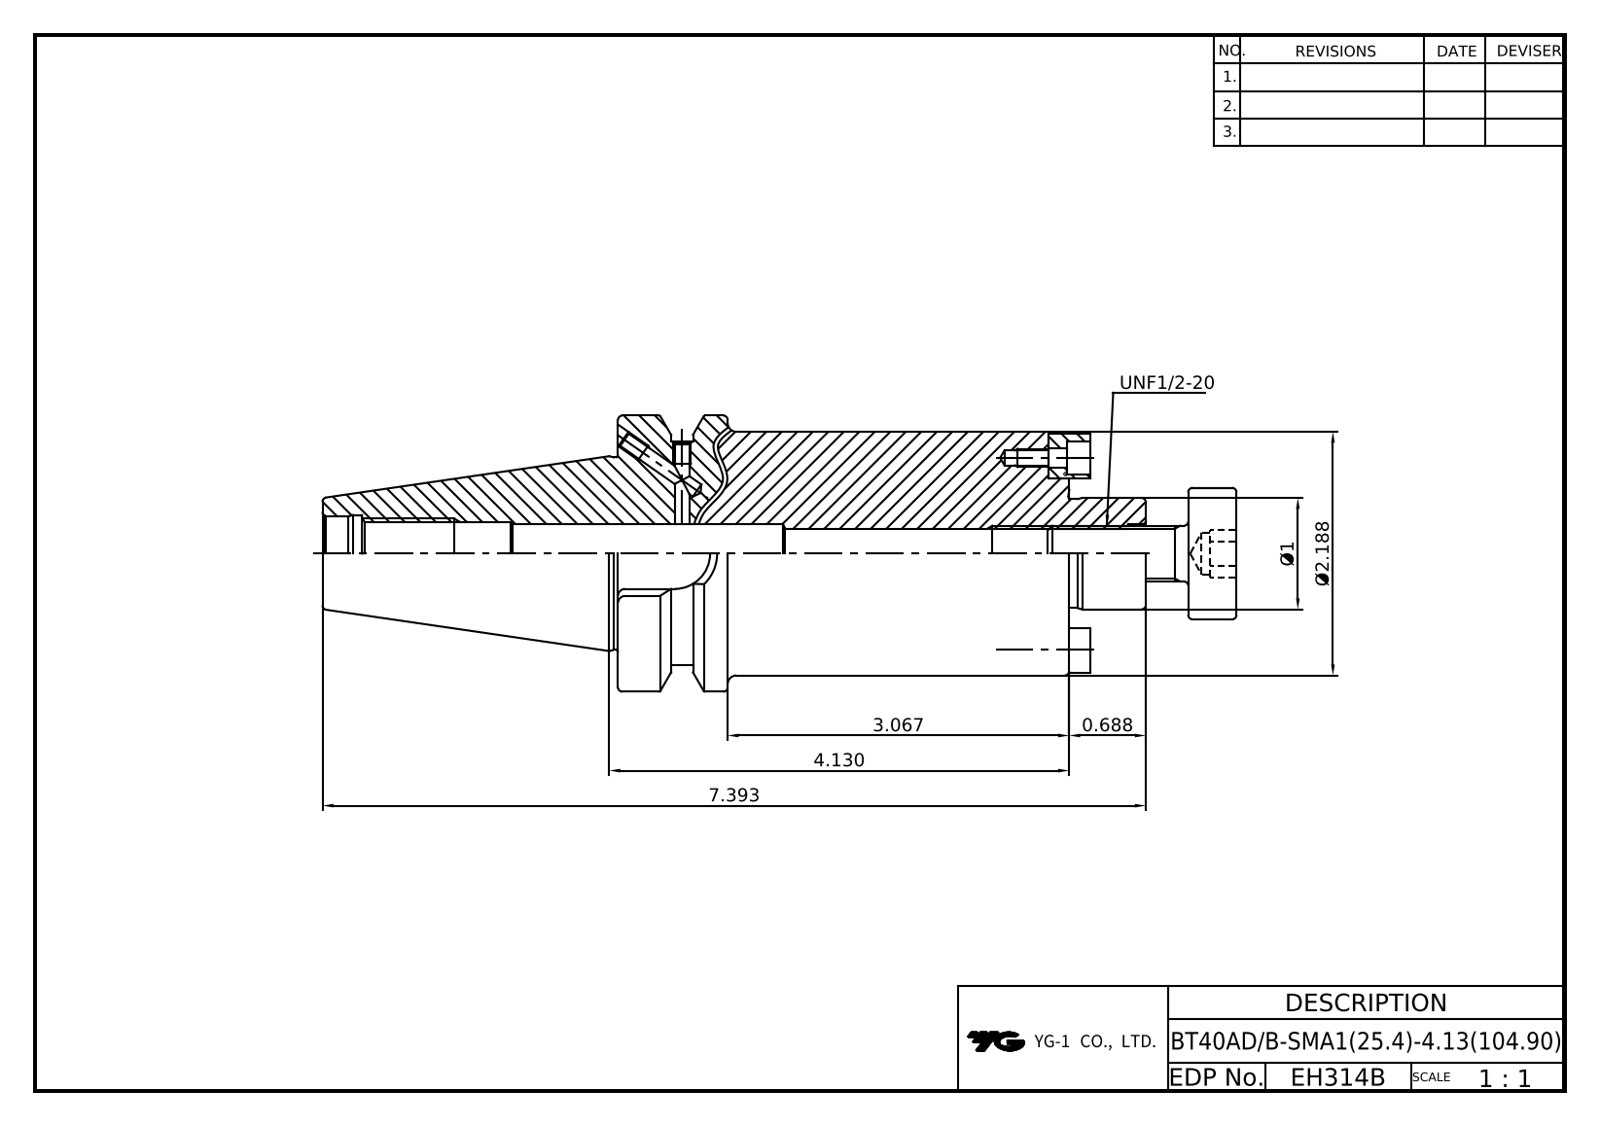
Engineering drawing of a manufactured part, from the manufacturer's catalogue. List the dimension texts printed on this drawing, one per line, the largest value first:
7.393
4.130
3.067
Ø2.188
Ø1
0.688
